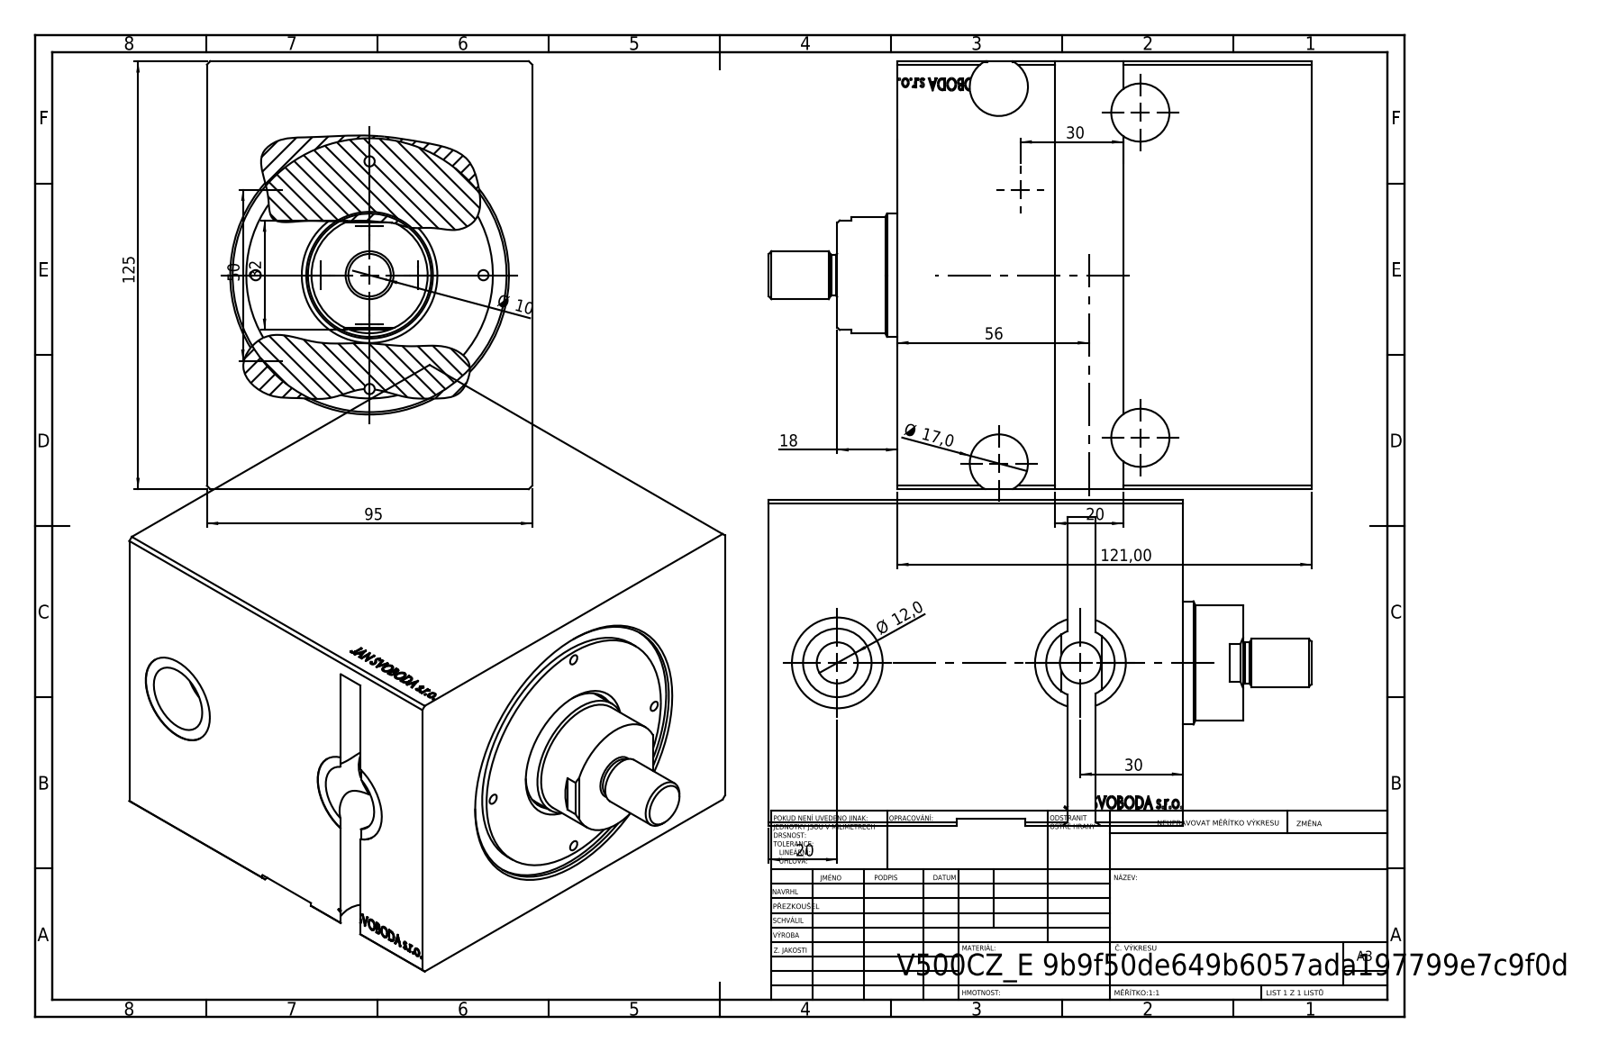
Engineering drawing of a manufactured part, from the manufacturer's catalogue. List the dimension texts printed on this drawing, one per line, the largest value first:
125
121,00
95
56
50
32
30
30
20
20
18
Ø 17,0
Ø 12,0
Ø 10
